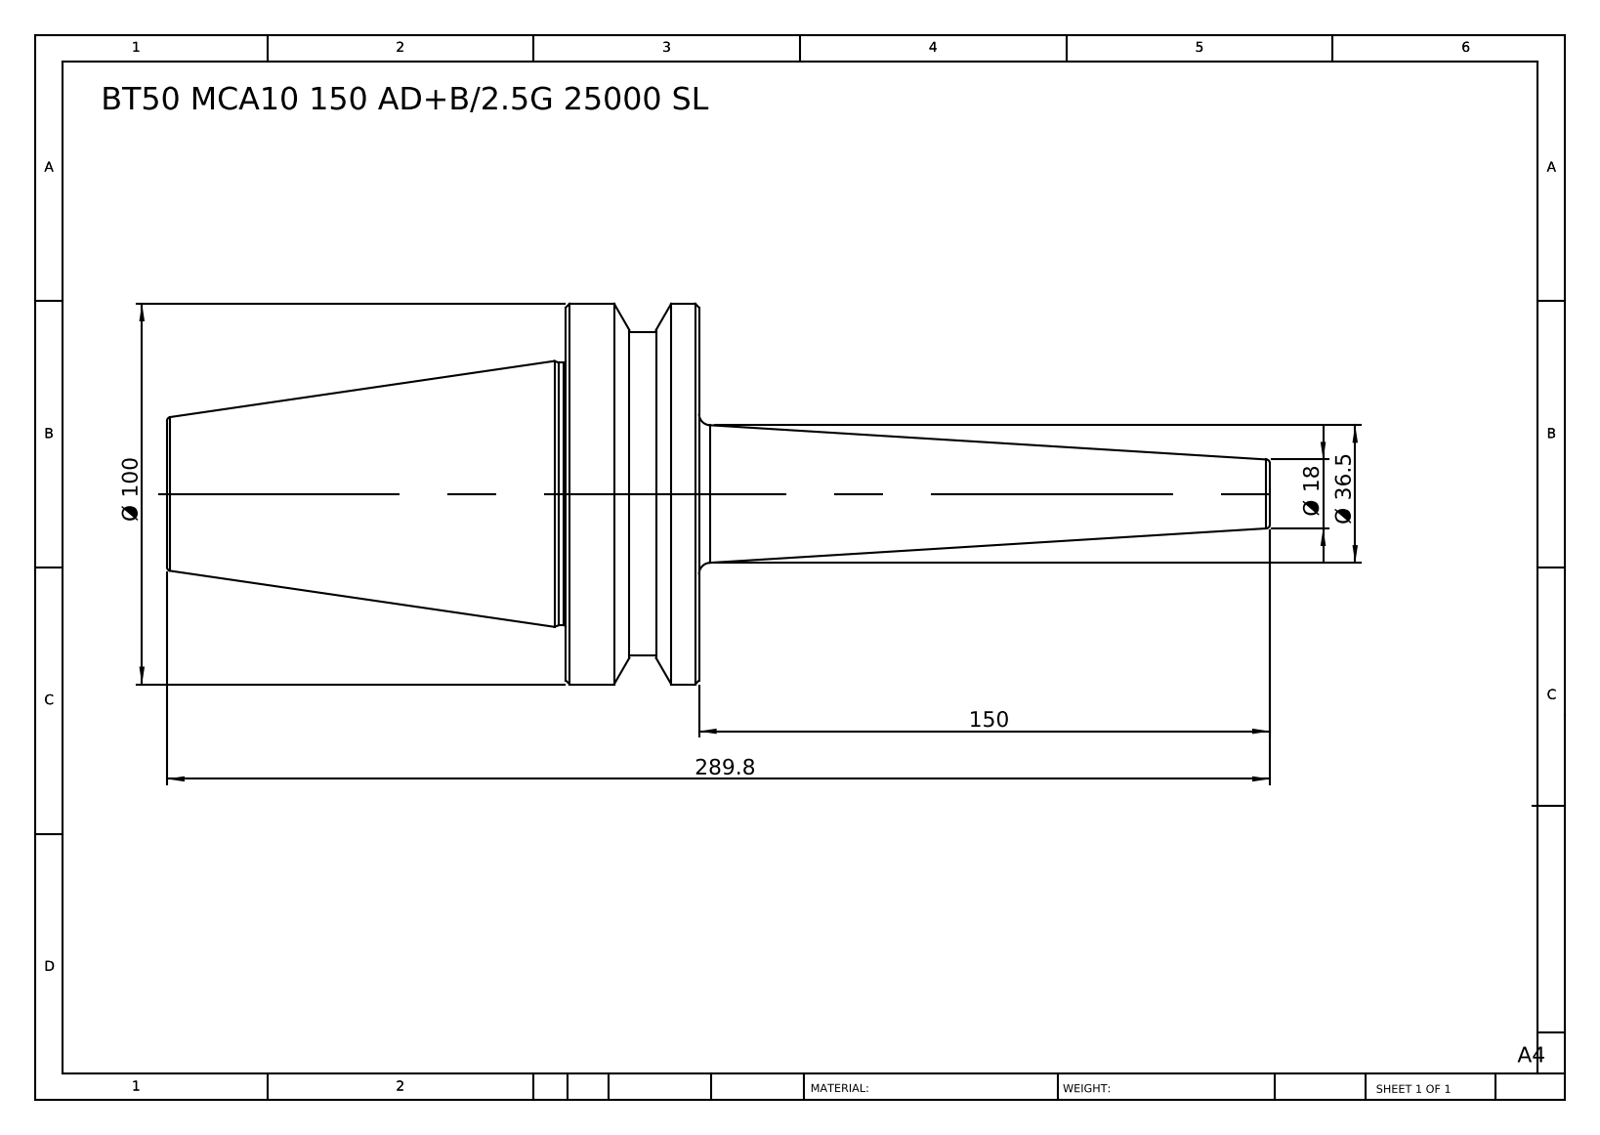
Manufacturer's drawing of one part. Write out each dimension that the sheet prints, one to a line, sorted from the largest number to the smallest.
289.8
150
Ø 100
Ø 36.5
Ø 18
